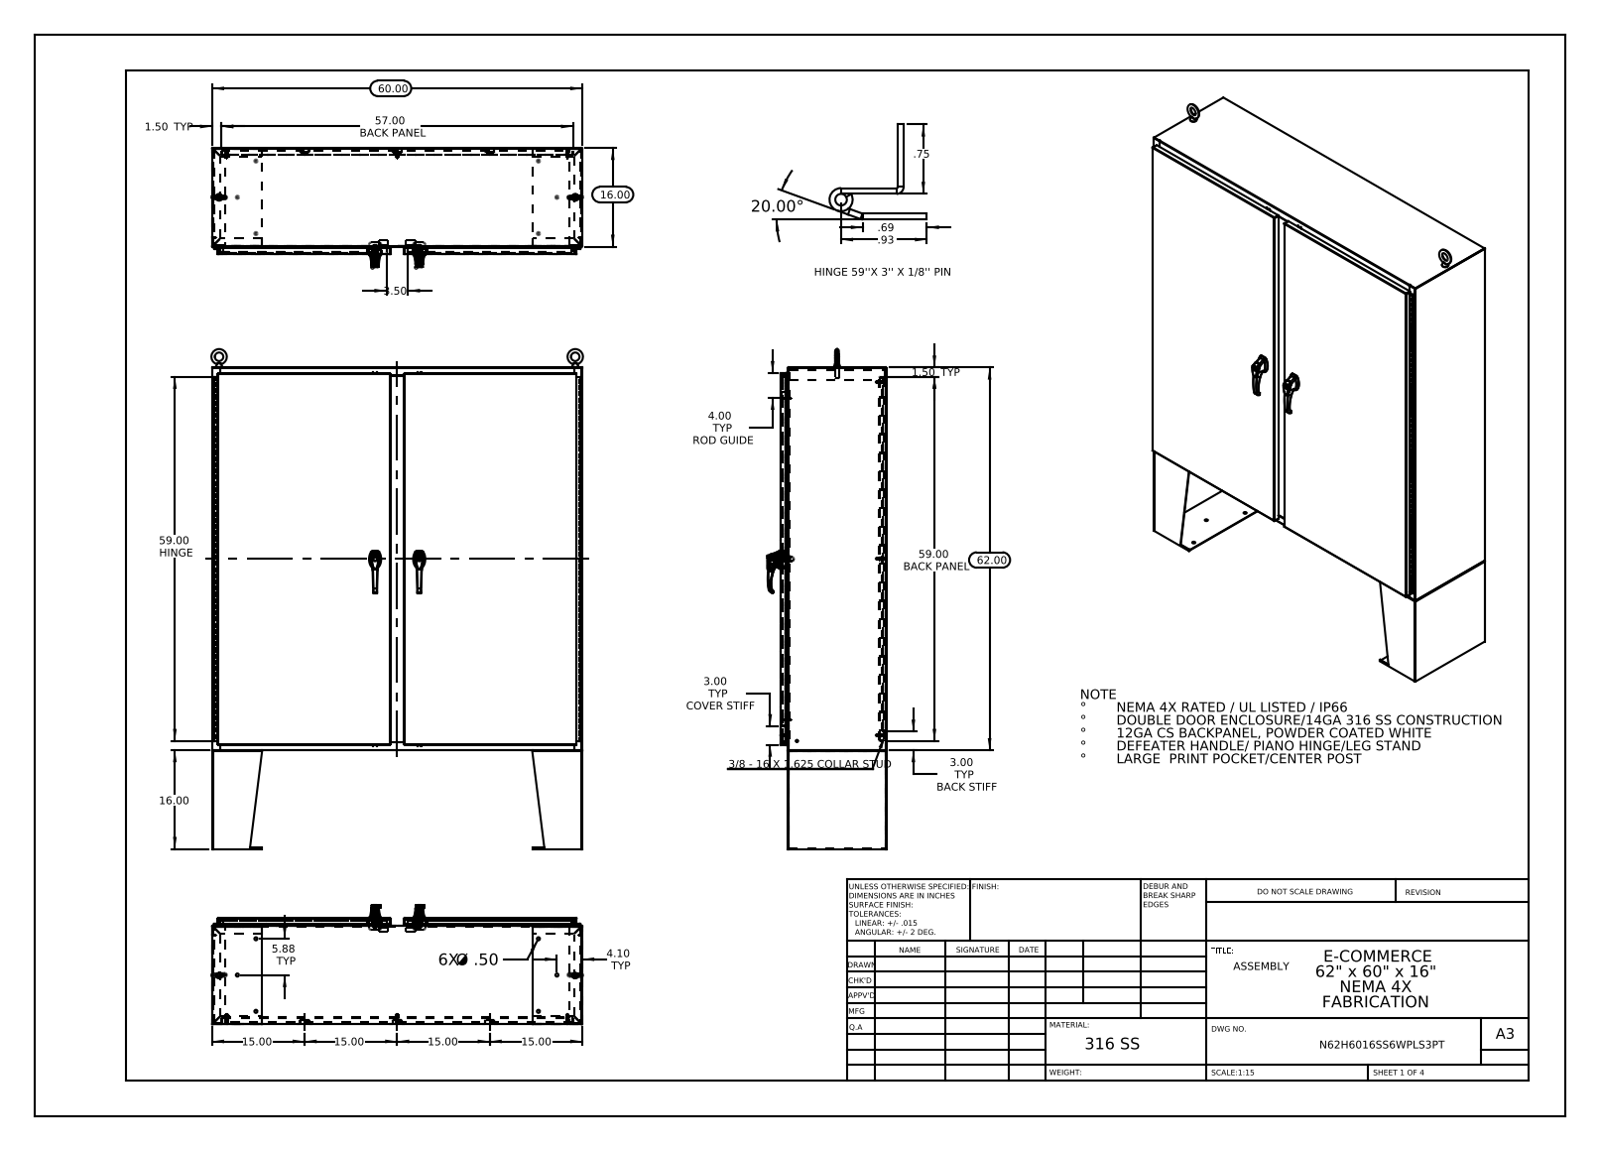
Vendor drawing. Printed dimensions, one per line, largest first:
62.00
60.00
59.00 HINGE
59.00 BACK PANEL
57.00 BACK PANEL
20.00°
16.00
16.00
15.00
15.00
15.00
15.00
5.88 TYP
4.10 TYP
4.00 TYP ROD GUIDE
3.50
3.00 TYP BACK STIFF
3.00 TYP COVER STIFF
1.50 TYP
1.50 TYP
.93
.75
.69
6X Ø .50
